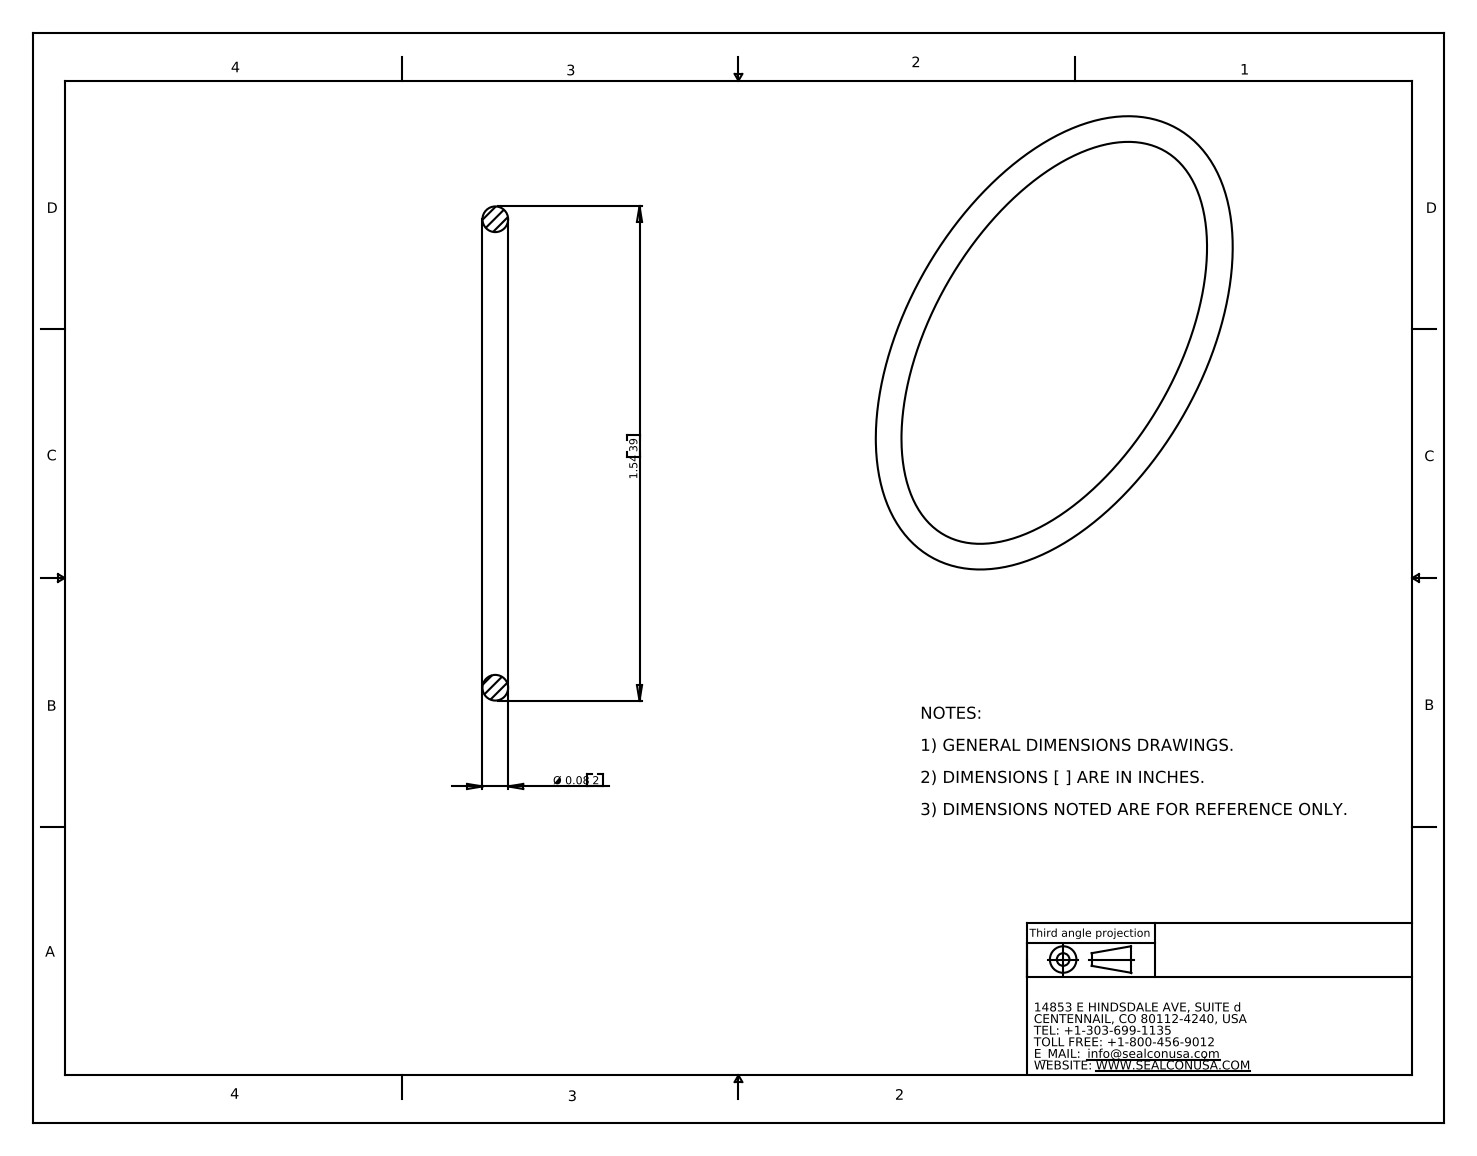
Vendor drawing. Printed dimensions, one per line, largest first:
1.54 39
Ø 0.08 2
